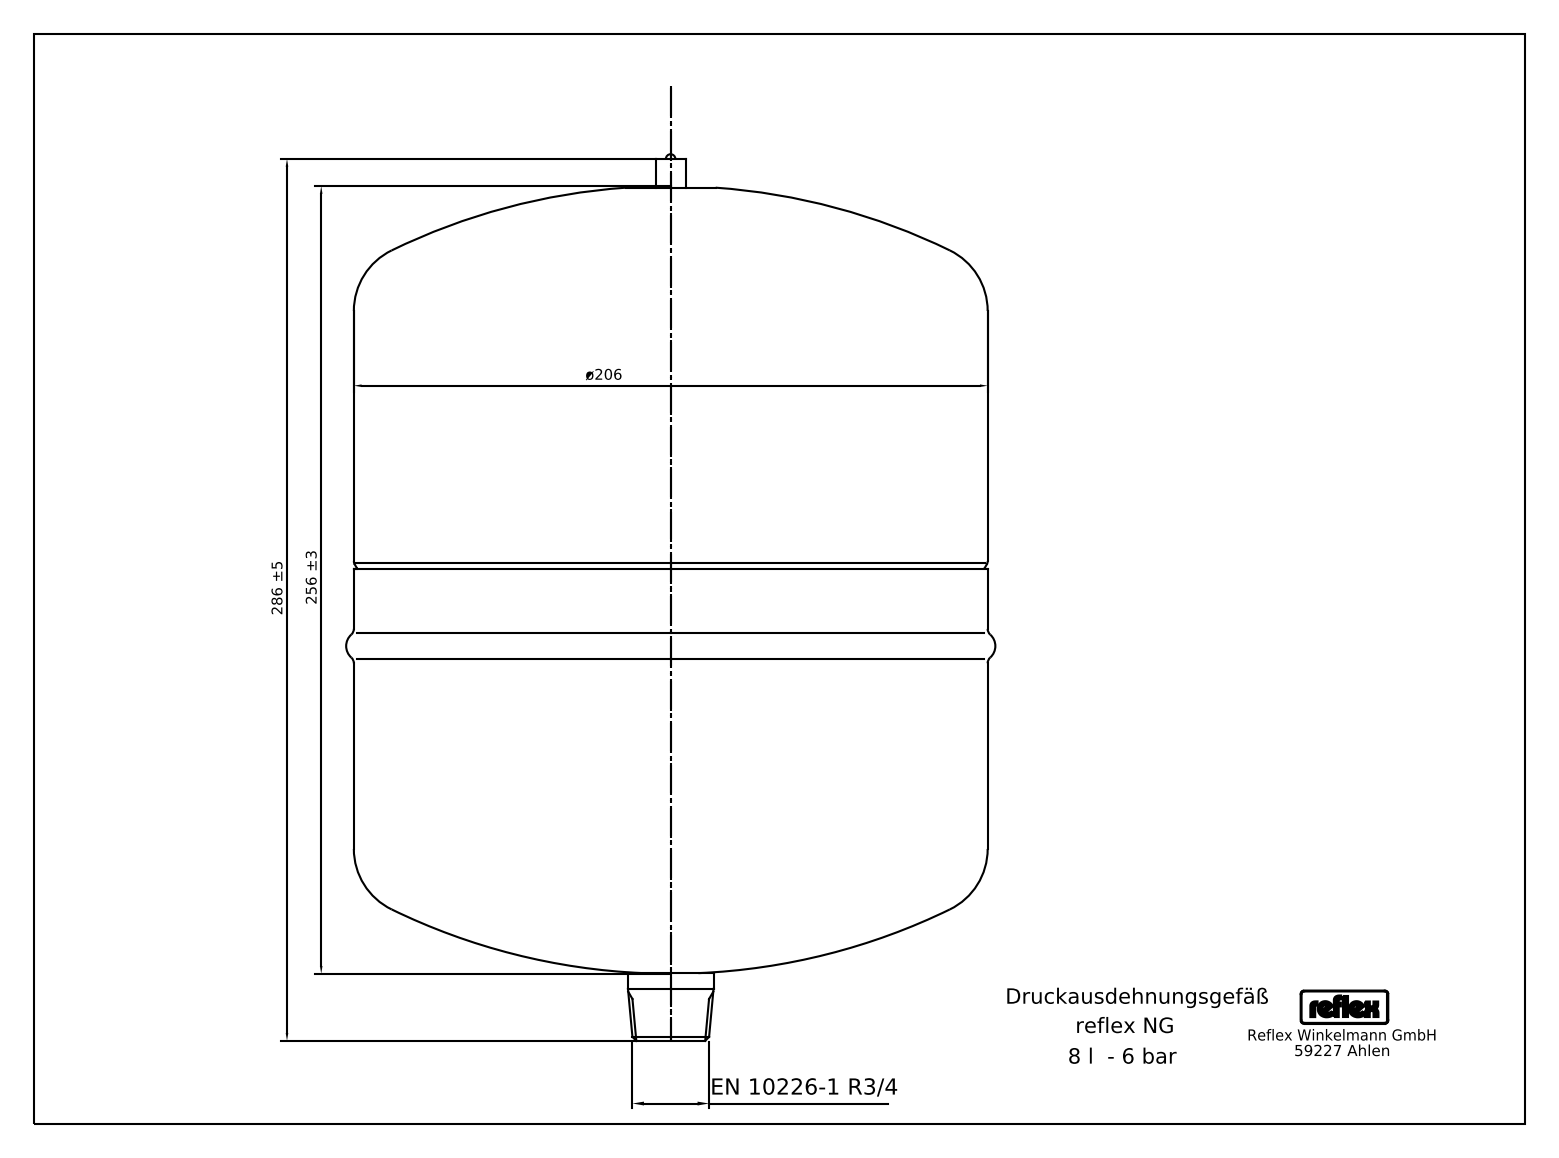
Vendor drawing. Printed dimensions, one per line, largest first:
EN 10226-1 R3/4
286 ±5
256 ±3
ø206
